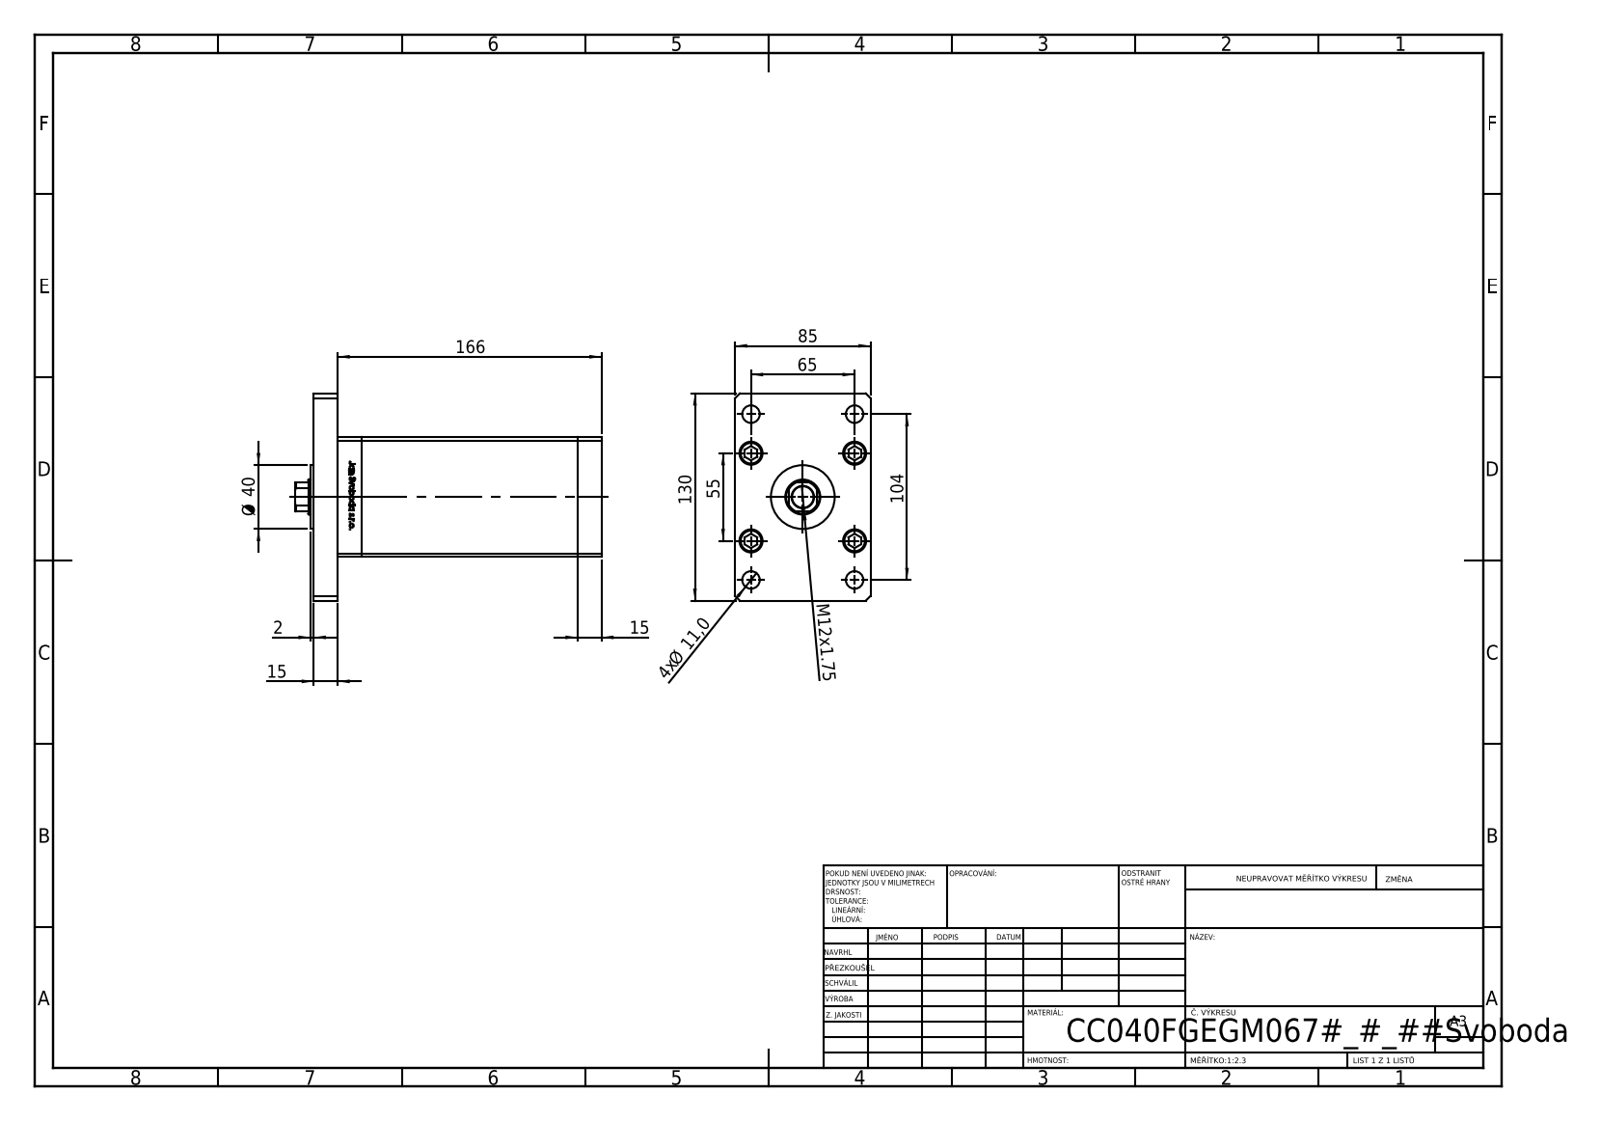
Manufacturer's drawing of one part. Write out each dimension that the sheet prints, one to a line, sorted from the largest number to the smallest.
166
130
104
85
65
55
Ø 40
15
15
M12x1.75
4x Ø 11,0
2
